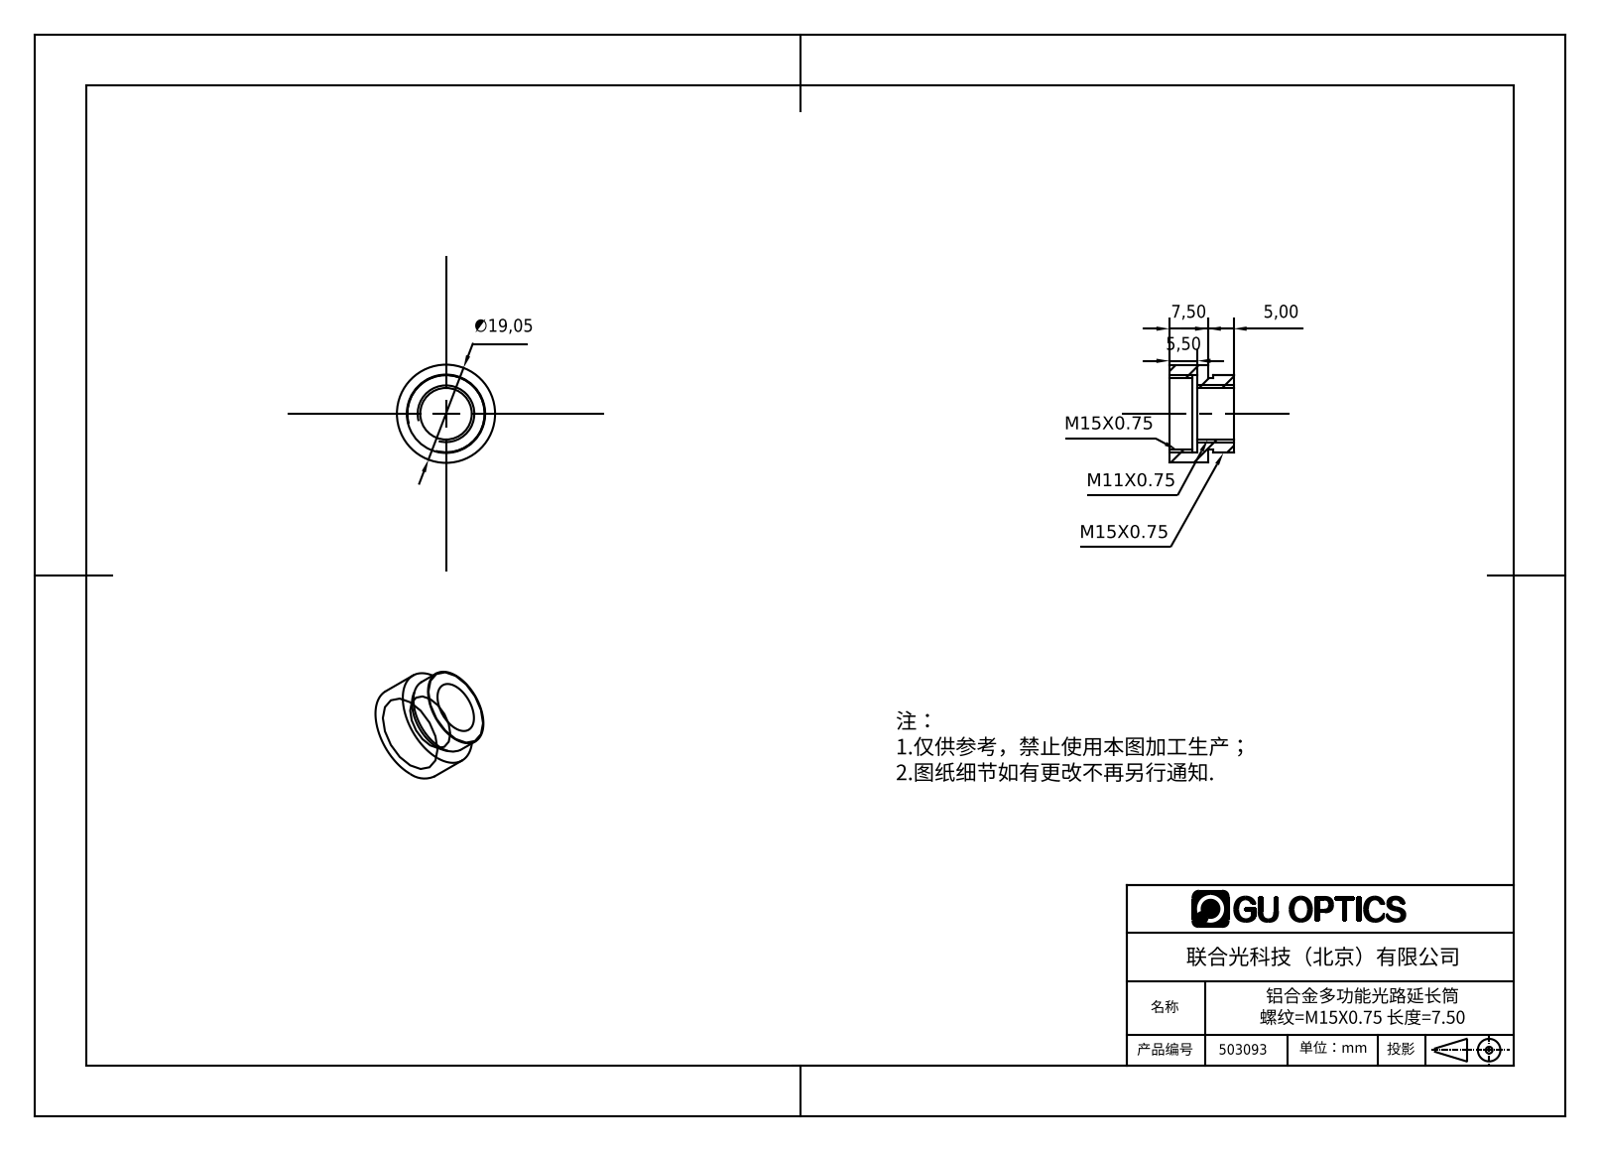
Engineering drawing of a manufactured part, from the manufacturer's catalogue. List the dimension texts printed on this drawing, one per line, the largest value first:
∅19,05
7,50
5,50
5,00
